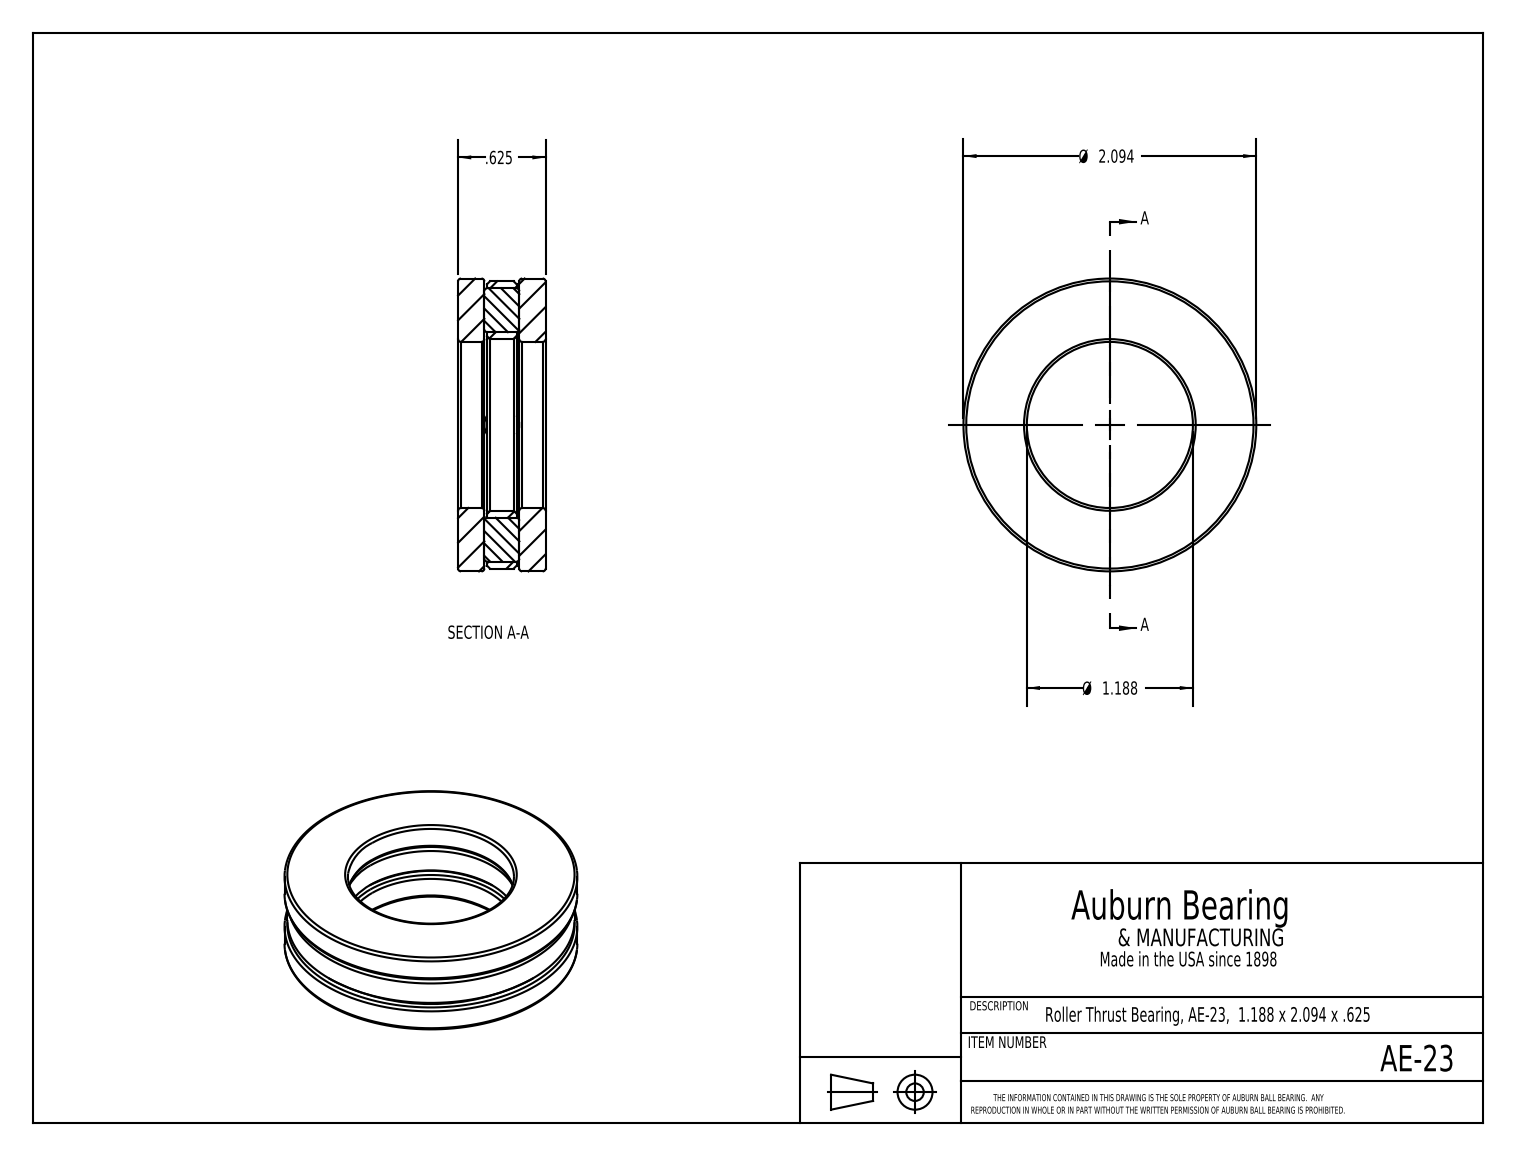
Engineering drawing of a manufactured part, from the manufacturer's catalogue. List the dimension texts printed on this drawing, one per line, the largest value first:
Ø 2.094
Ø 1.188
.625
